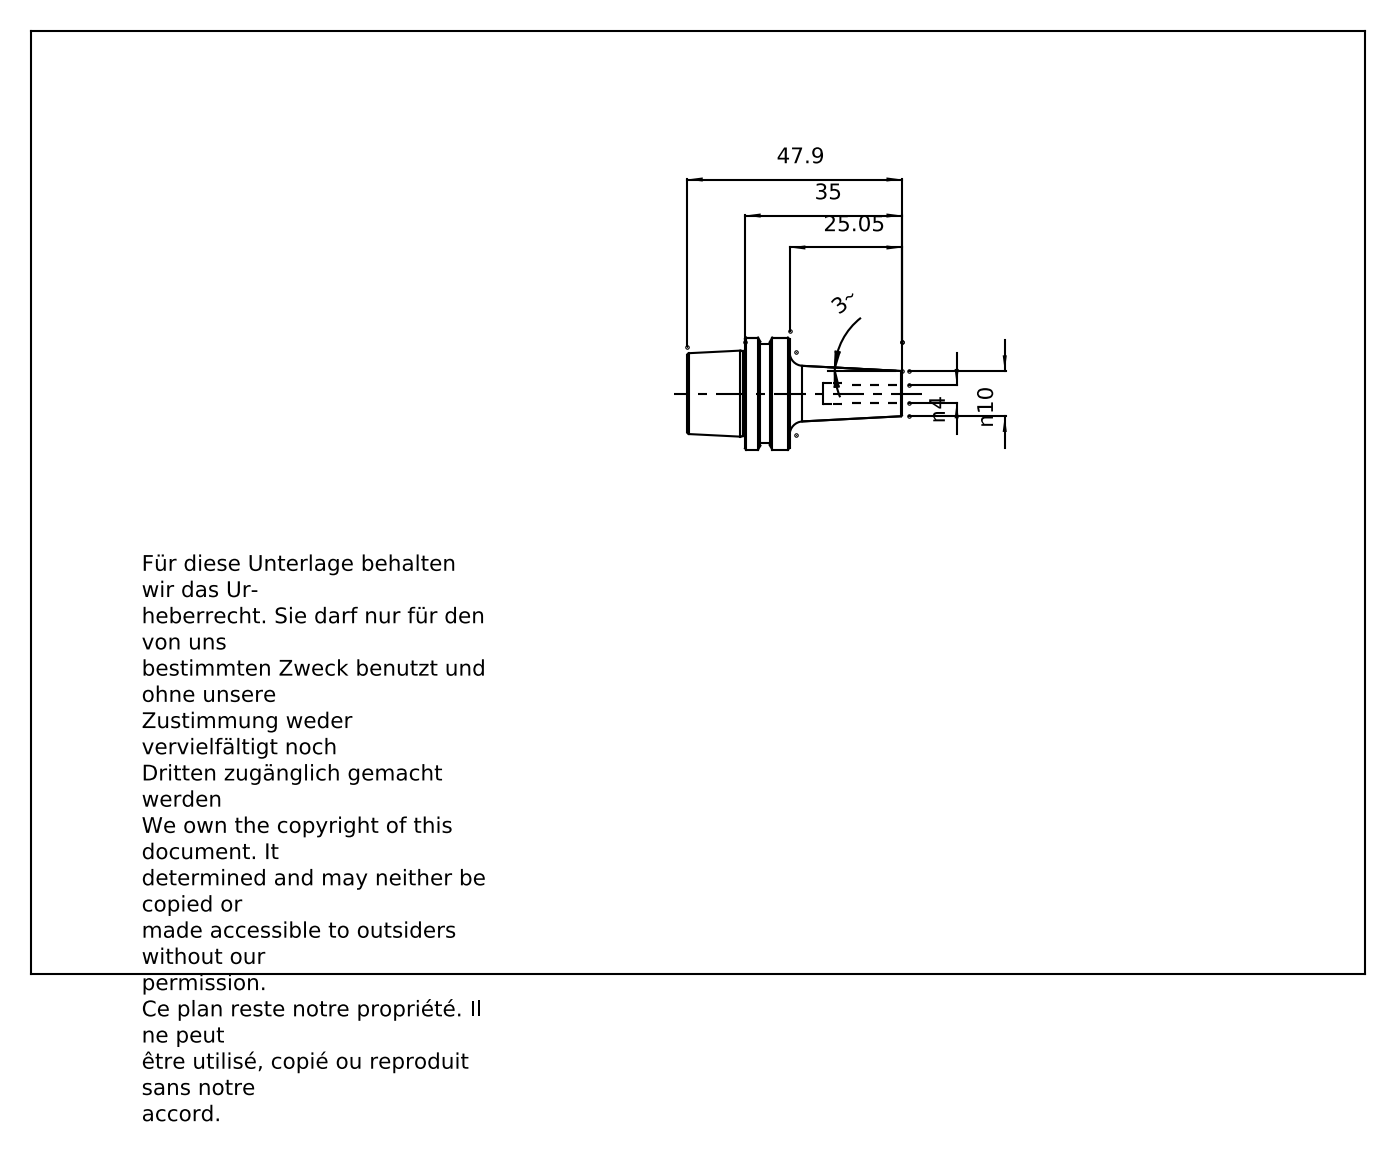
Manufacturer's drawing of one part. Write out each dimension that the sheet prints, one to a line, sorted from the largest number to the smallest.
47.9
35
25.05
n10
n4
